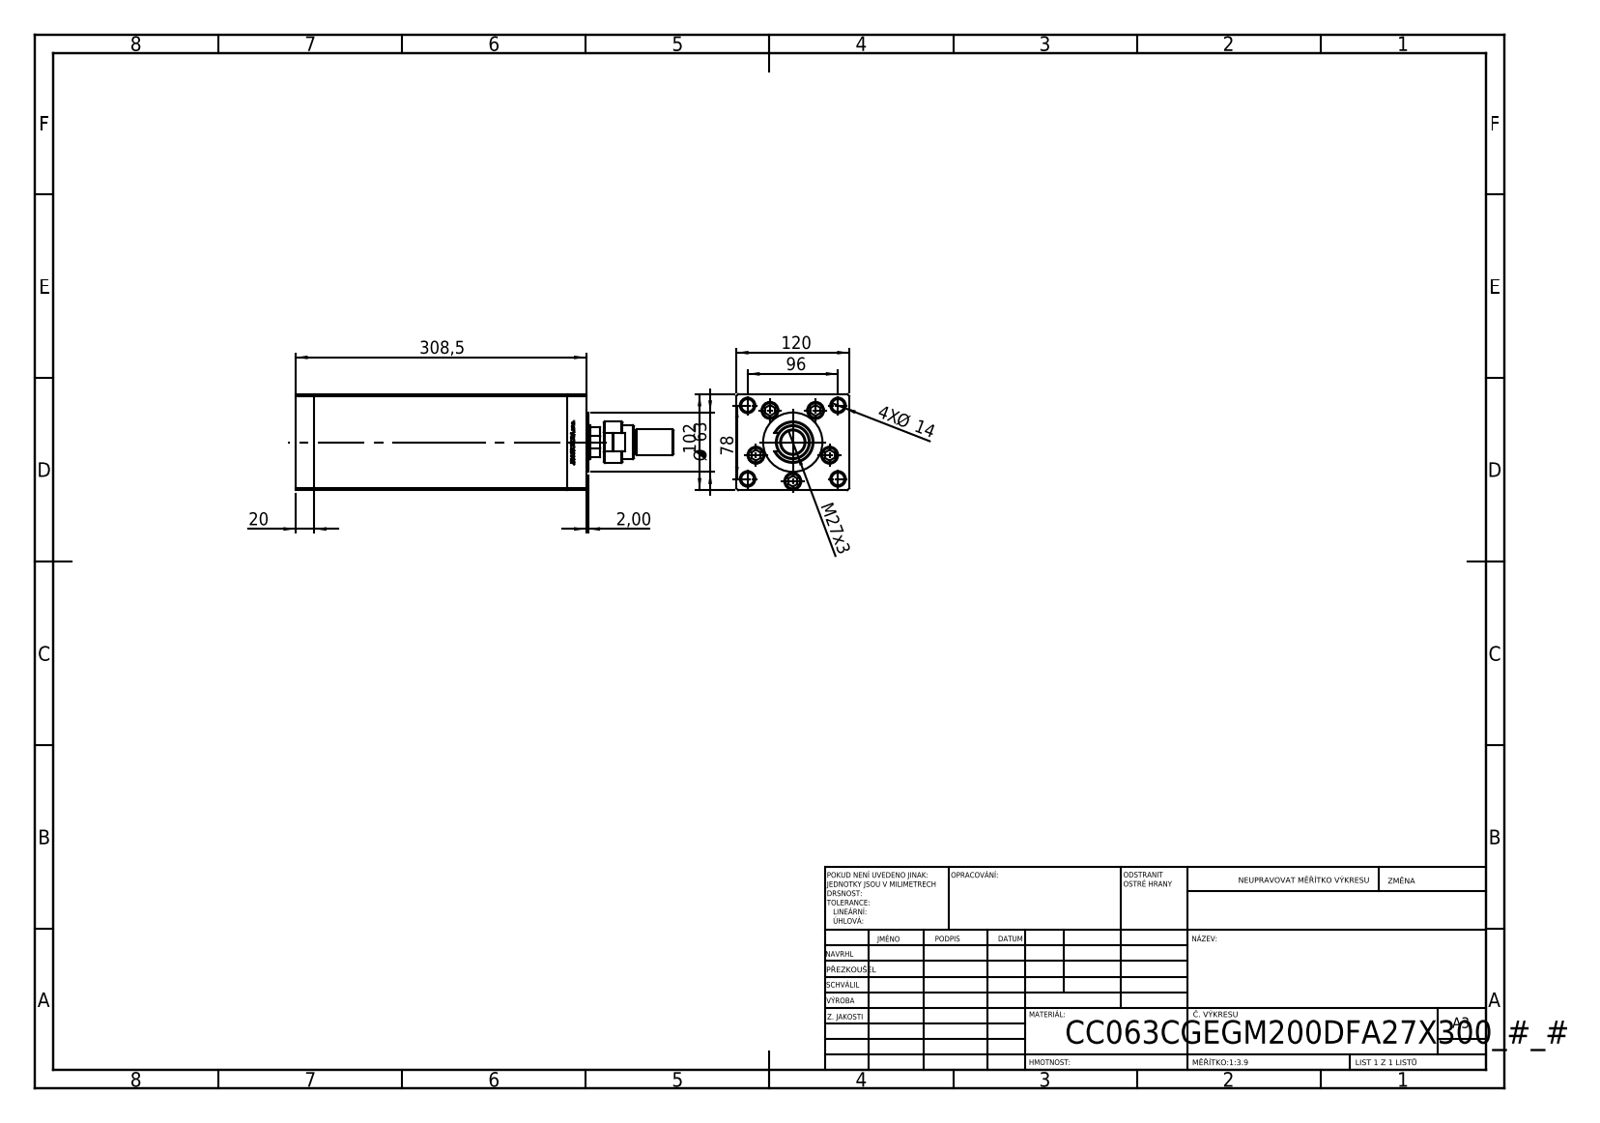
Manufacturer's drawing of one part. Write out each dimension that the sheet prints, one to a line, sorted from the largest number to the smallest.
308,5
120
102
96
78
Ø 63
M27x3
20
4X Ø 14
2,00
